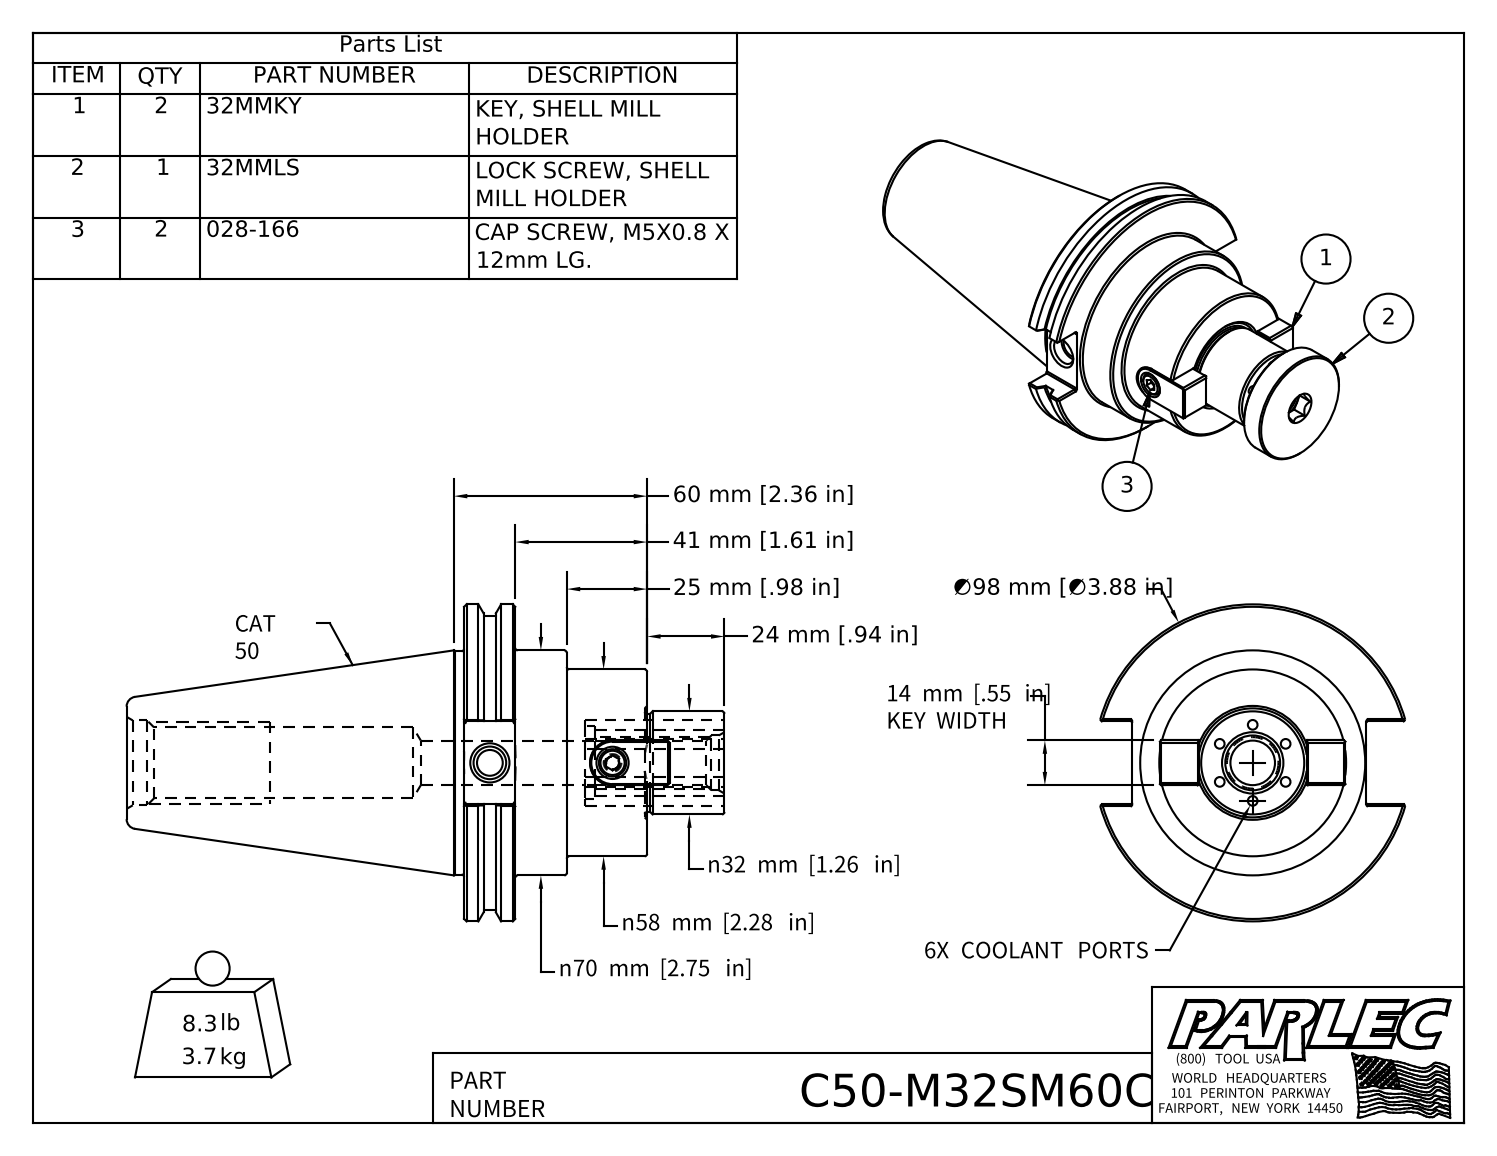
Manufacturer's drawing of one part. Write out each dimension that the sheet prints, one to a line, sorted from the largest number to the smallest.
∅98 mm [∅3.88 in]
n70 mm [2.75 in]
60 mm [2.36 in]
n58 mm [2.28 in]
41 mm [1.61 in]
n32 mm [1.26 in]
25 mm [.98 in]
24 mm [.94 in]
14 mm [.55 in] KEY WIDTH
6X COOLANT PORTS
